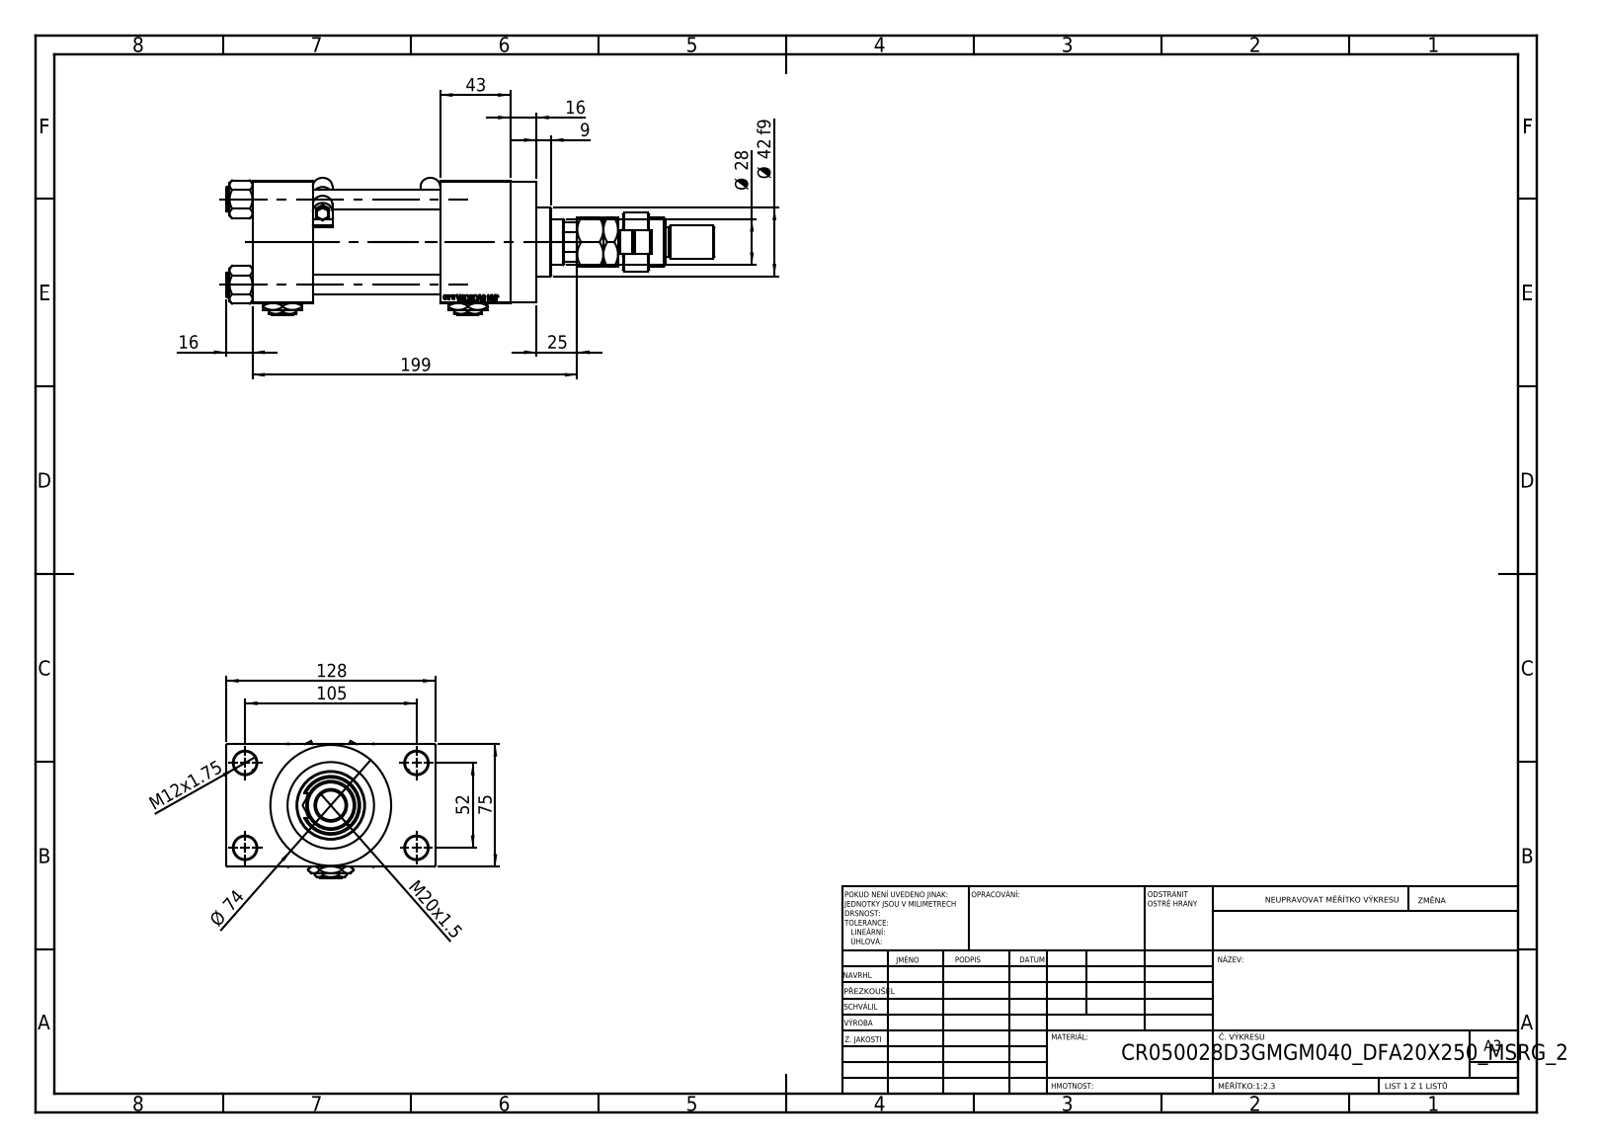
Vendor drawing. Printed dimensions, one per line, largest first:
199
128
105
75
Ø 74
52
43
Ø 42 f9
Ø 28
25
M20x1.5
16
16
M12x1.75
9
